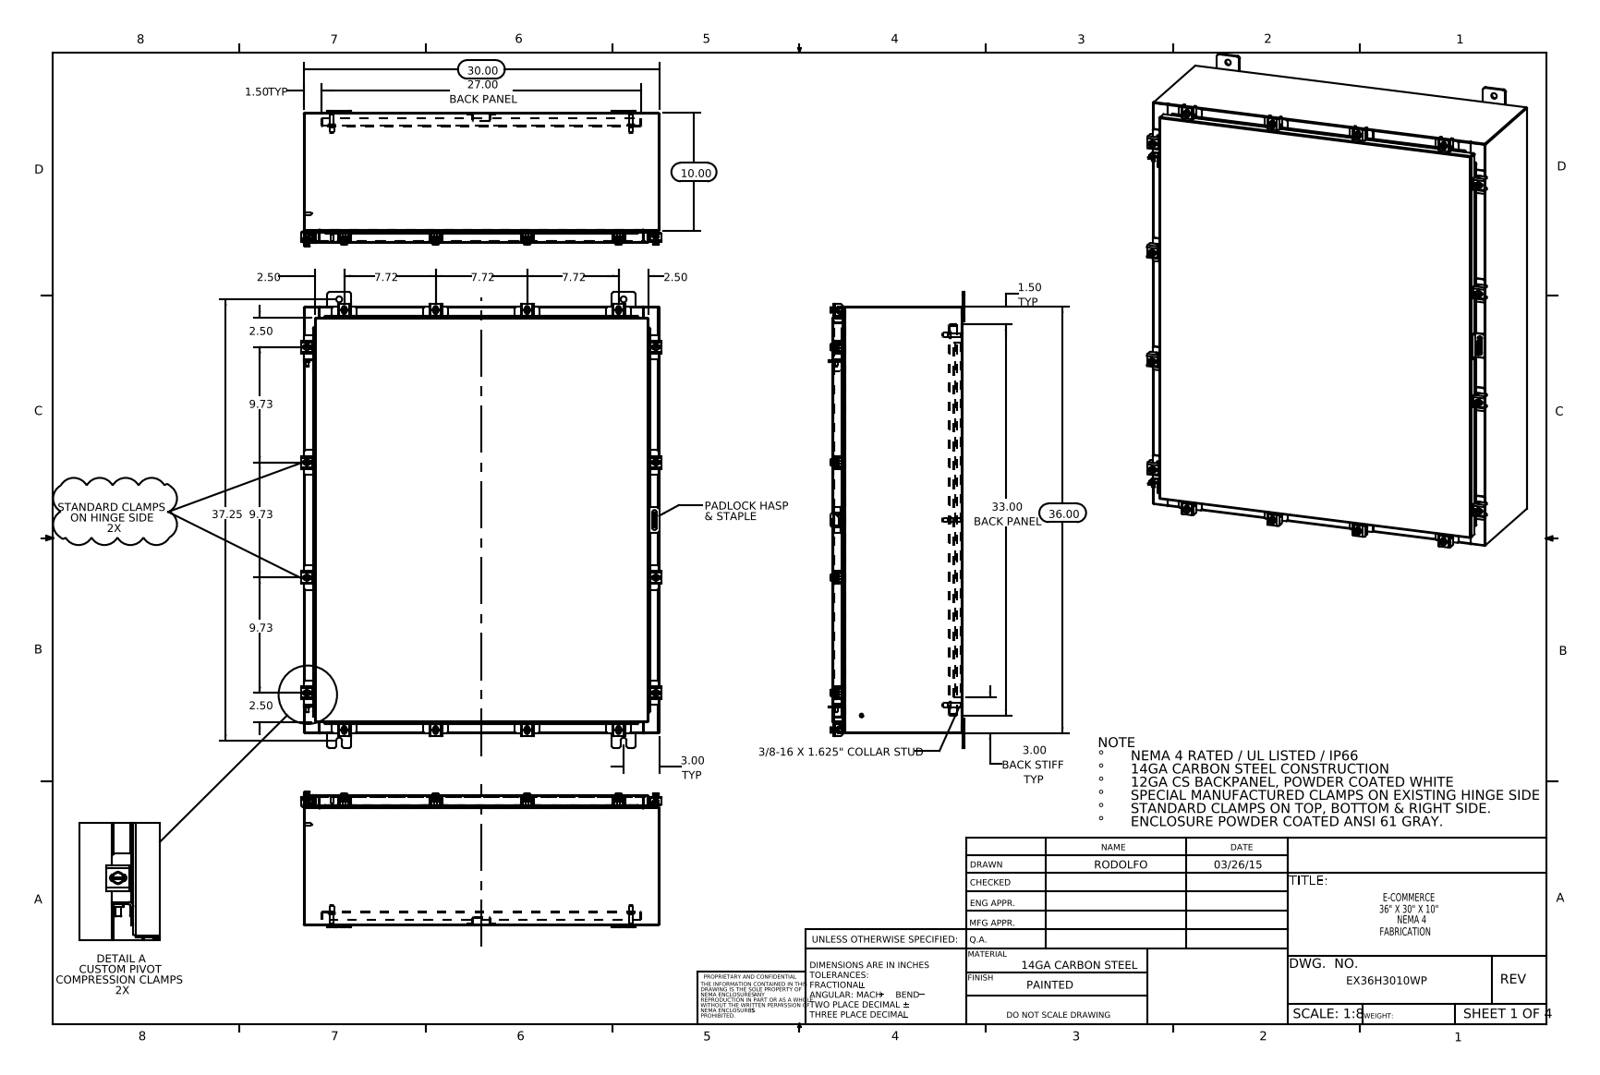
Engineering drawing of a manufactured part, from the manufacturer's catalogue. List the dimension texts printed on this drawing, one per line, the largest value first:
37.25
36.00
33.00 BACK PANEL
30.00
27.00 BACK PANEL
10.00
9.73
9.73
9.73
7.72
7.72
7.72
3.00 TYP
3.00 BACK STIFF TYP
2.50
2.50
2.50
2.50
1.50 TYP
1.50 TYP
